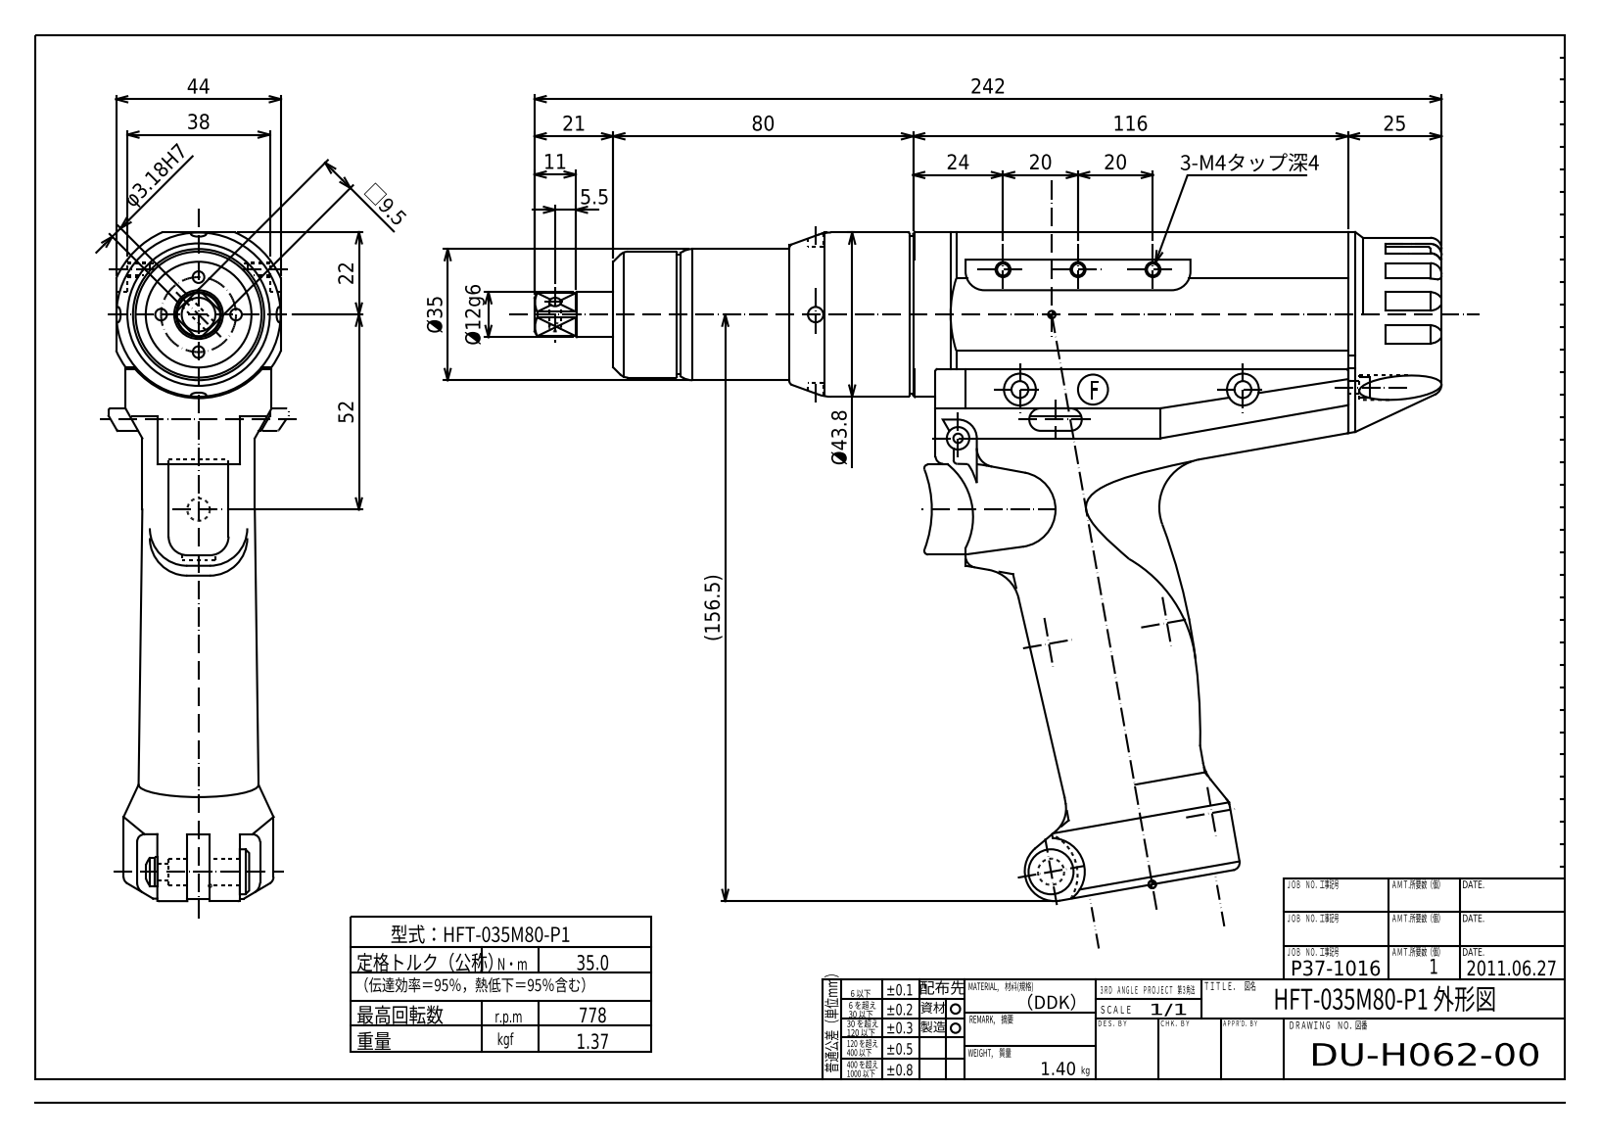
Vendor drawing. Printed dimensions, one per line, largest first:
242
(156.5)
116
80
52
44
Ø43.8
38
Ø35
25
24
22
21
20
20
Ø12g6
11
□9.5
5.5
3-M4タップ深4
φ3.18H7
